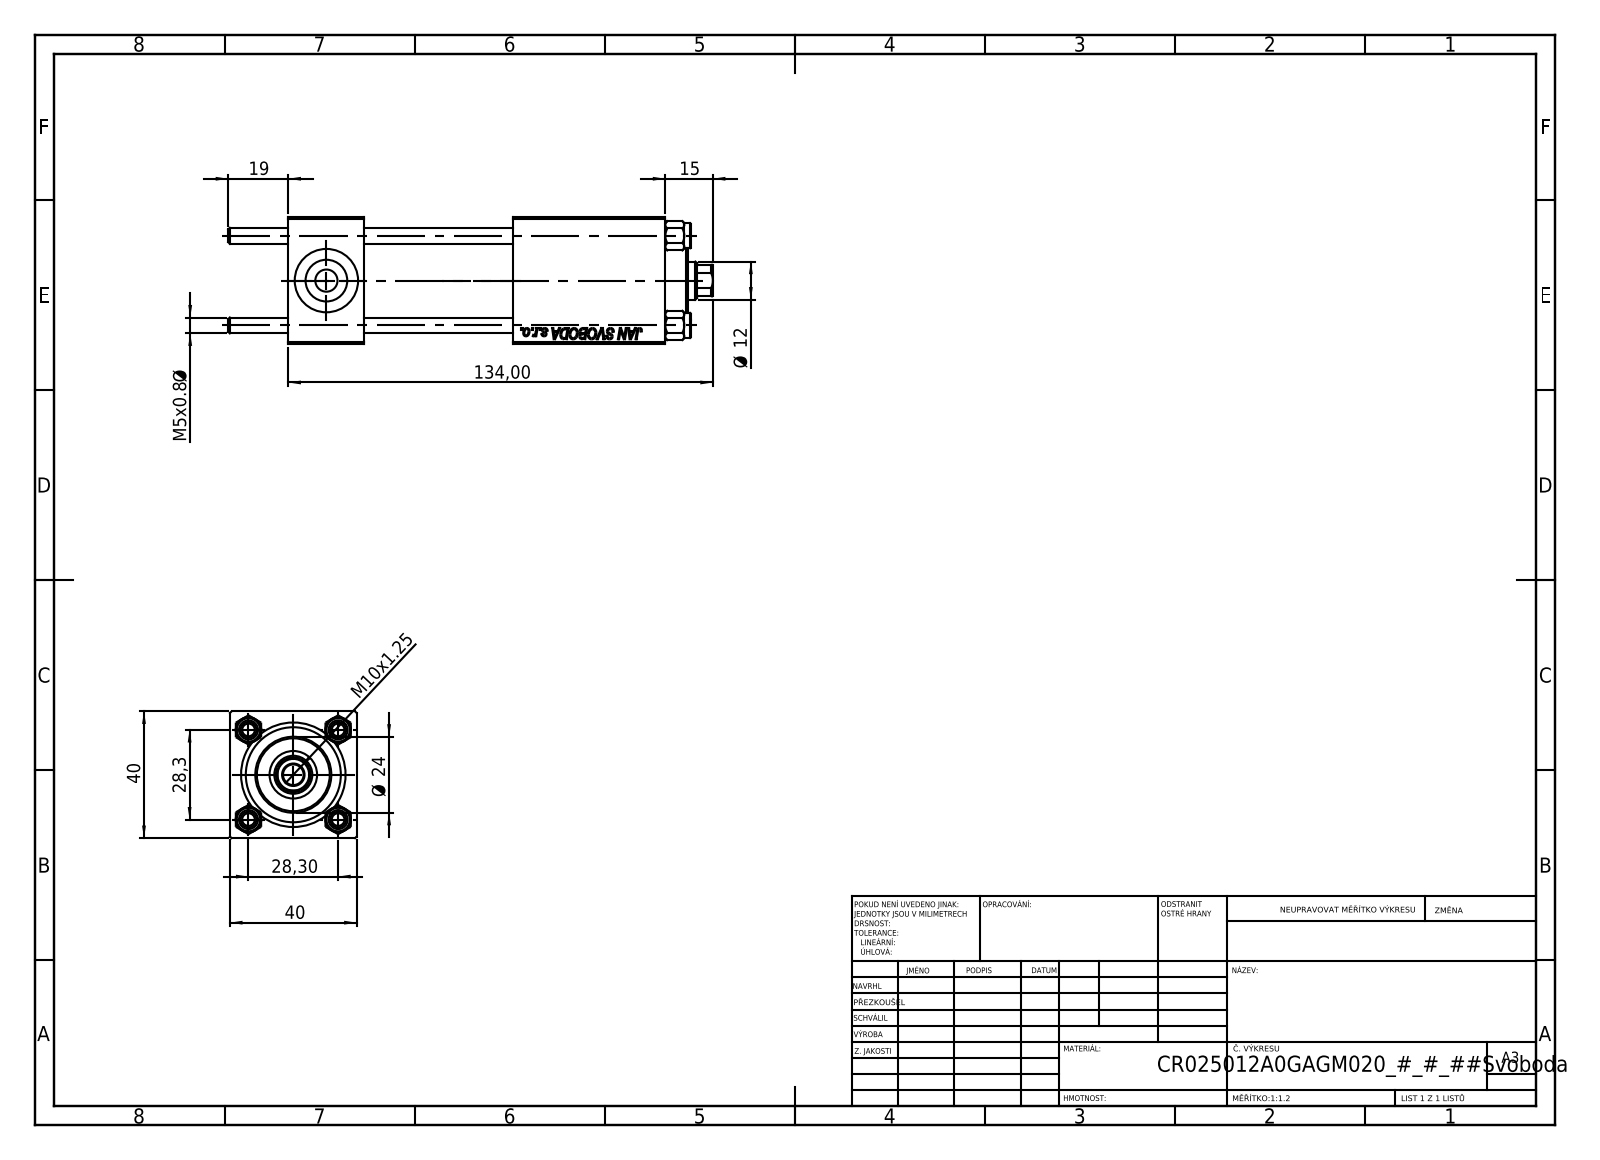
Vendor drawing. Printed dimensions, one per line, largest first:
134,00
40
40
28,3
28,30
Ø 24
19
15
Ø 12
M10x1.25
M5x0.8 Ø
